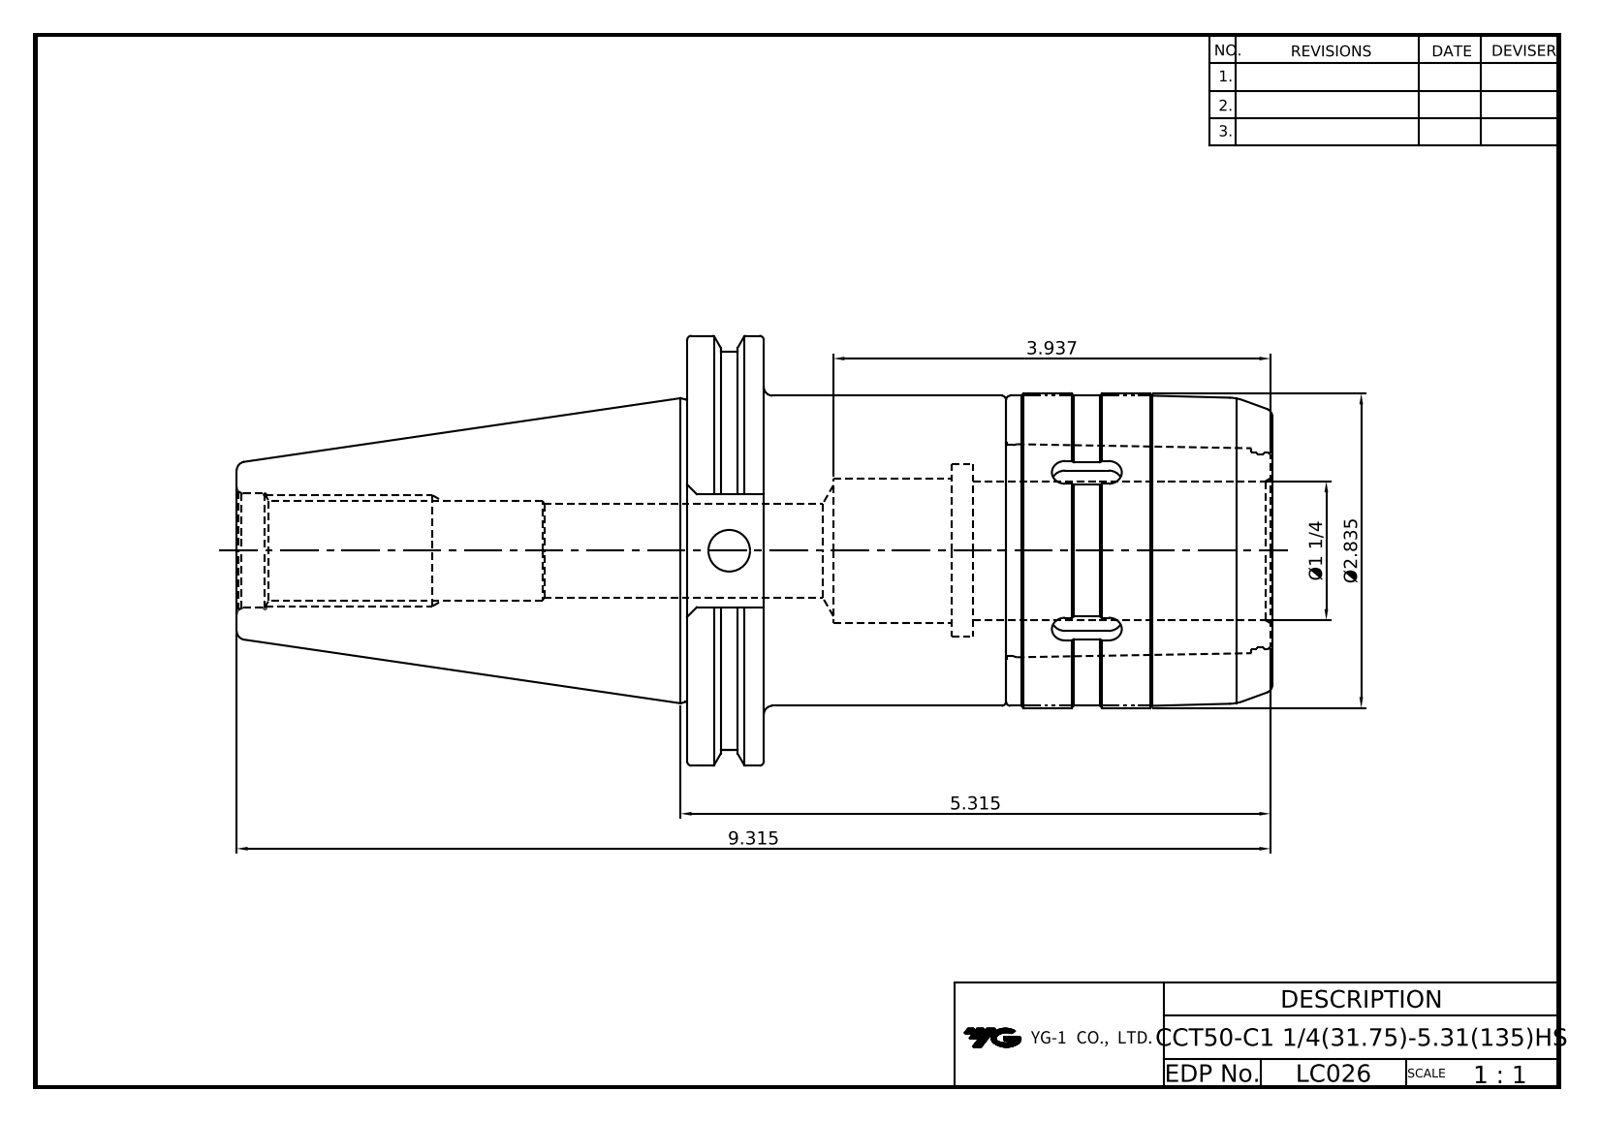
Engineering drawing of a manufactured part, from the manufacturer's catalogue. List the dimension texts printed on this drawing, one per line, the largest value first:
9.315
5.315
3.937
Ø2.835
Ø1 1/4
